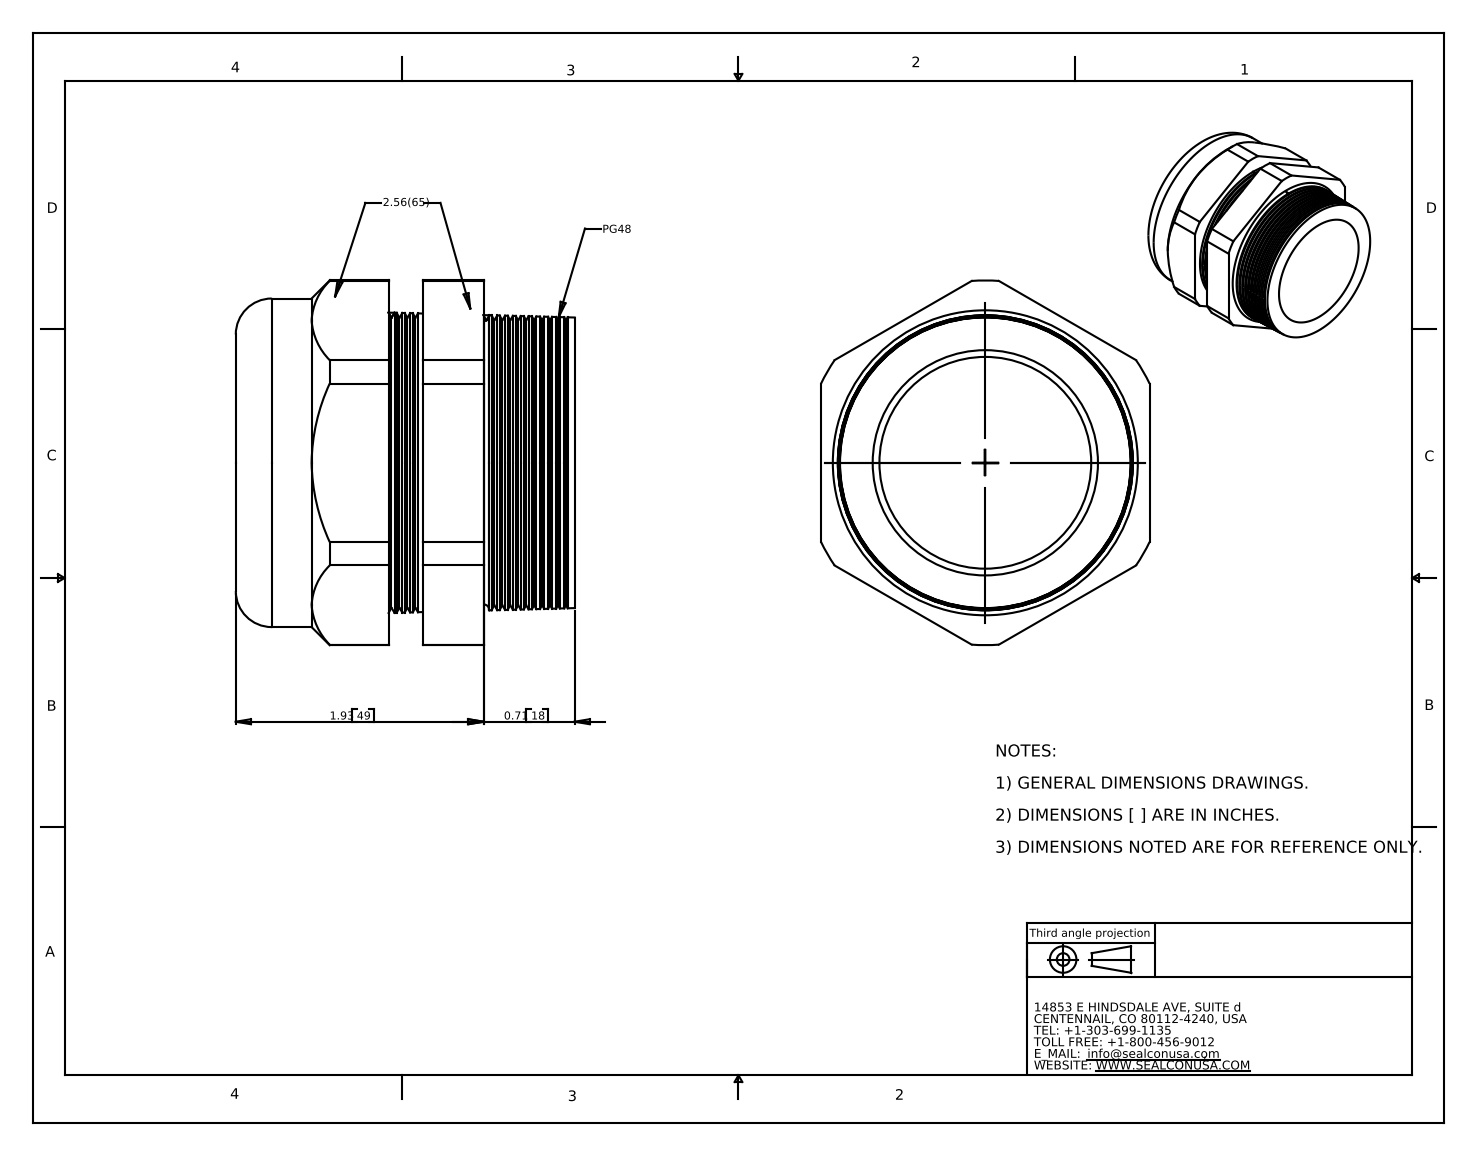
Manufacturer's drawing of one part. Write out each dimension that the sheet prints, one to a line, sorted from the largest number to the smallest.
1.93 49
0.71 18
